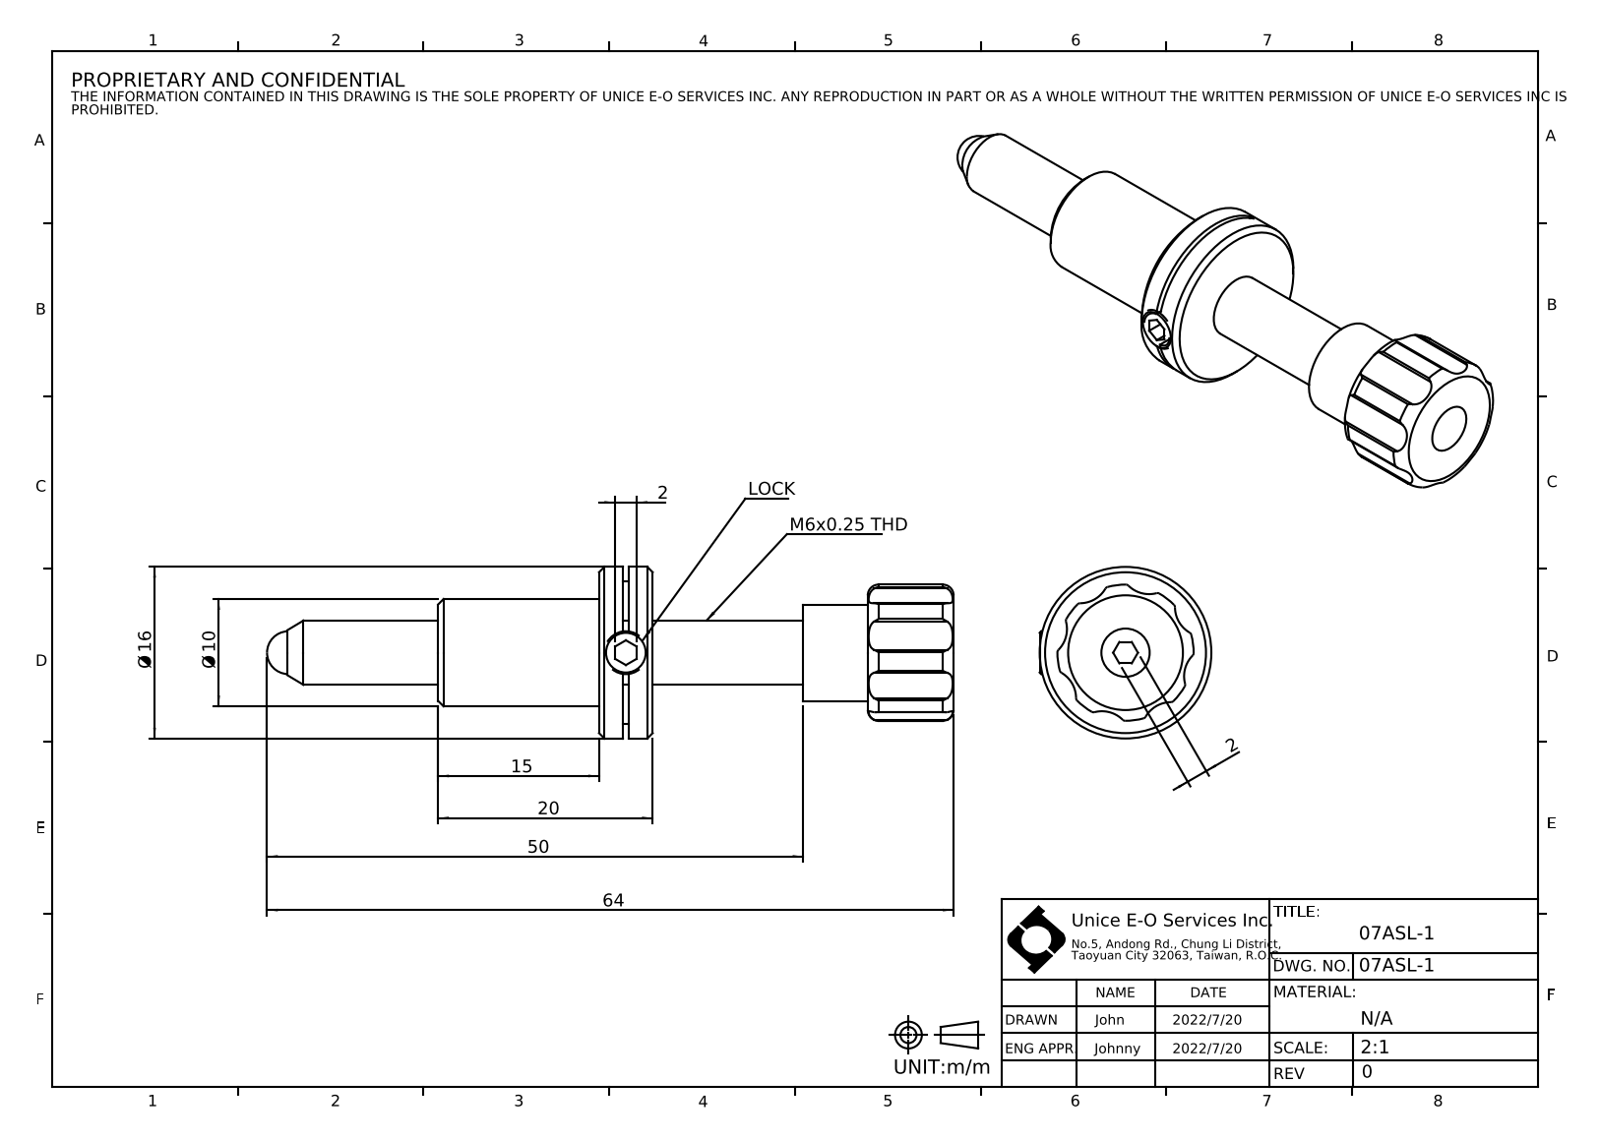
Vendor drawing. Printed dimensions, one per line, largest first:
64
50
20
Ø 16
15
Ø 10
2
2
